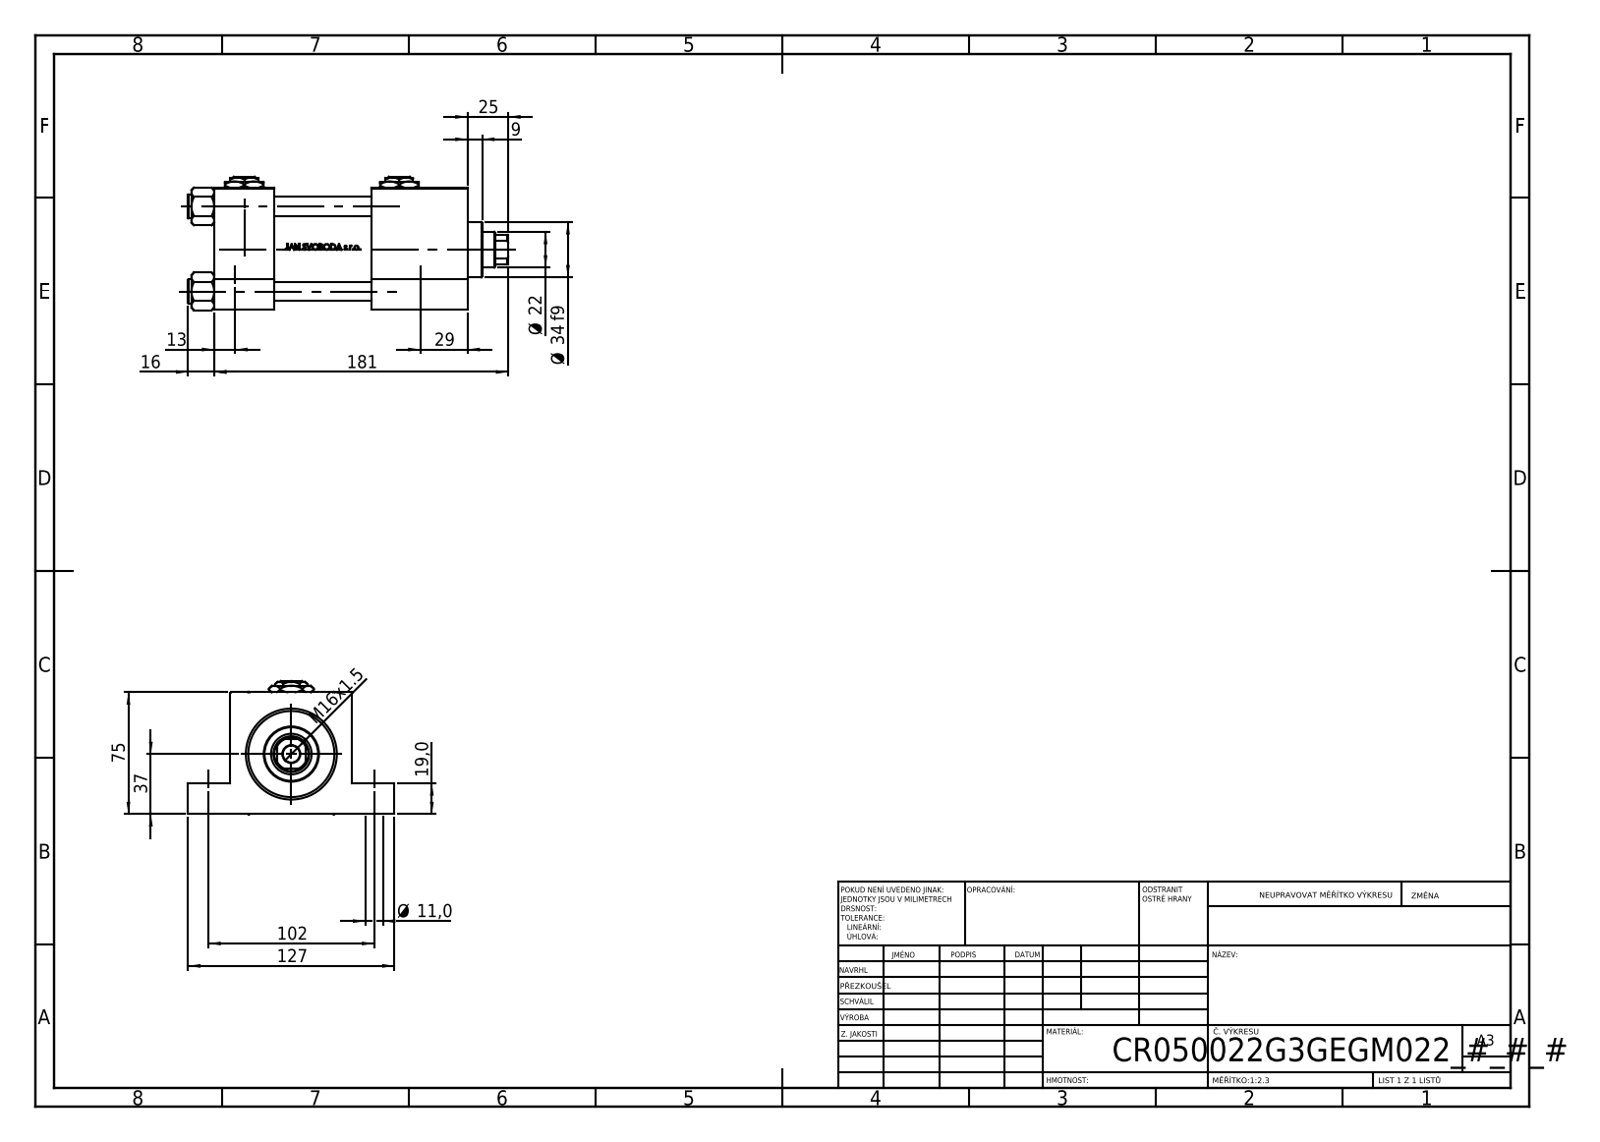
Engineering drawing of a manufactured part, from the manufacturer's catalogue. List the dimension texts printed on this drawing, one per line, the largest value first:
181
127
102
75
37
Ø 34 f9
29
25
Ø 22
19,0
16
M16x1.5
13
Ø 11,0
9
